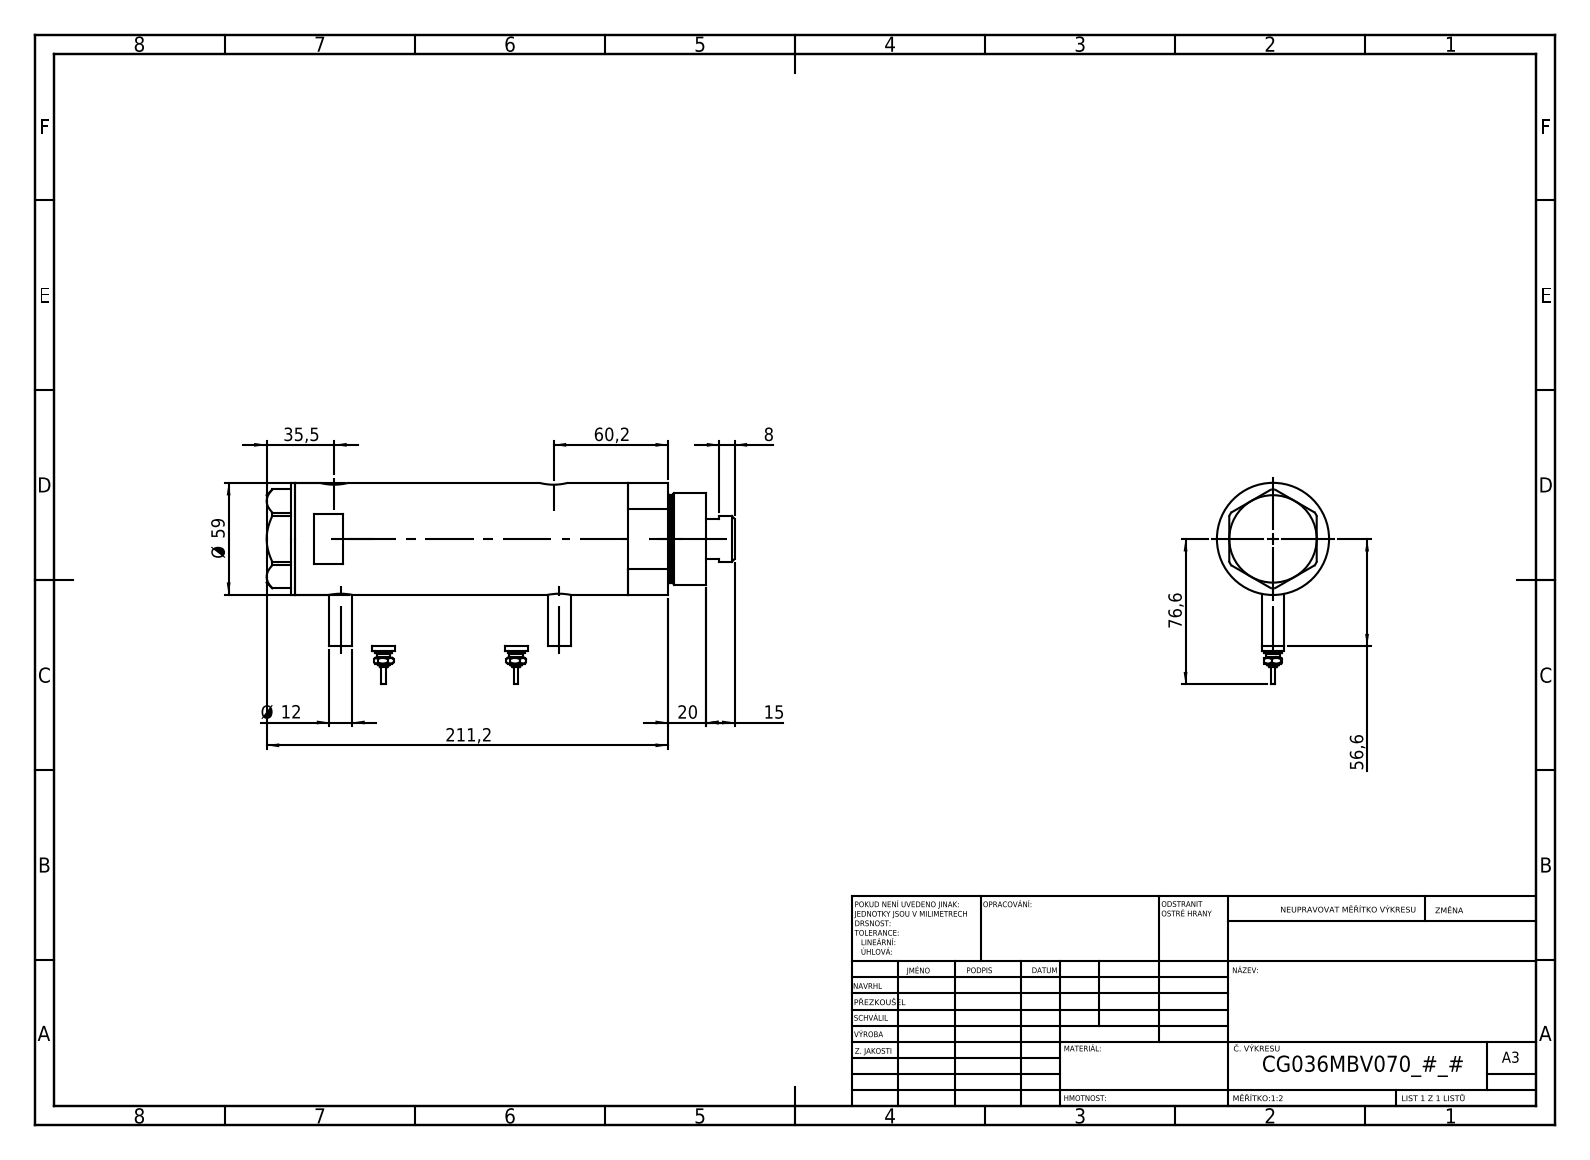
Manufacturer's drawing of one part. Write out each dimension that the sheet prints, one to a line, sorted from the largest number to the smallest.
211,2
76,6
60,2
Ø 59
56,6
35,5
20
15
Ø 12
8
